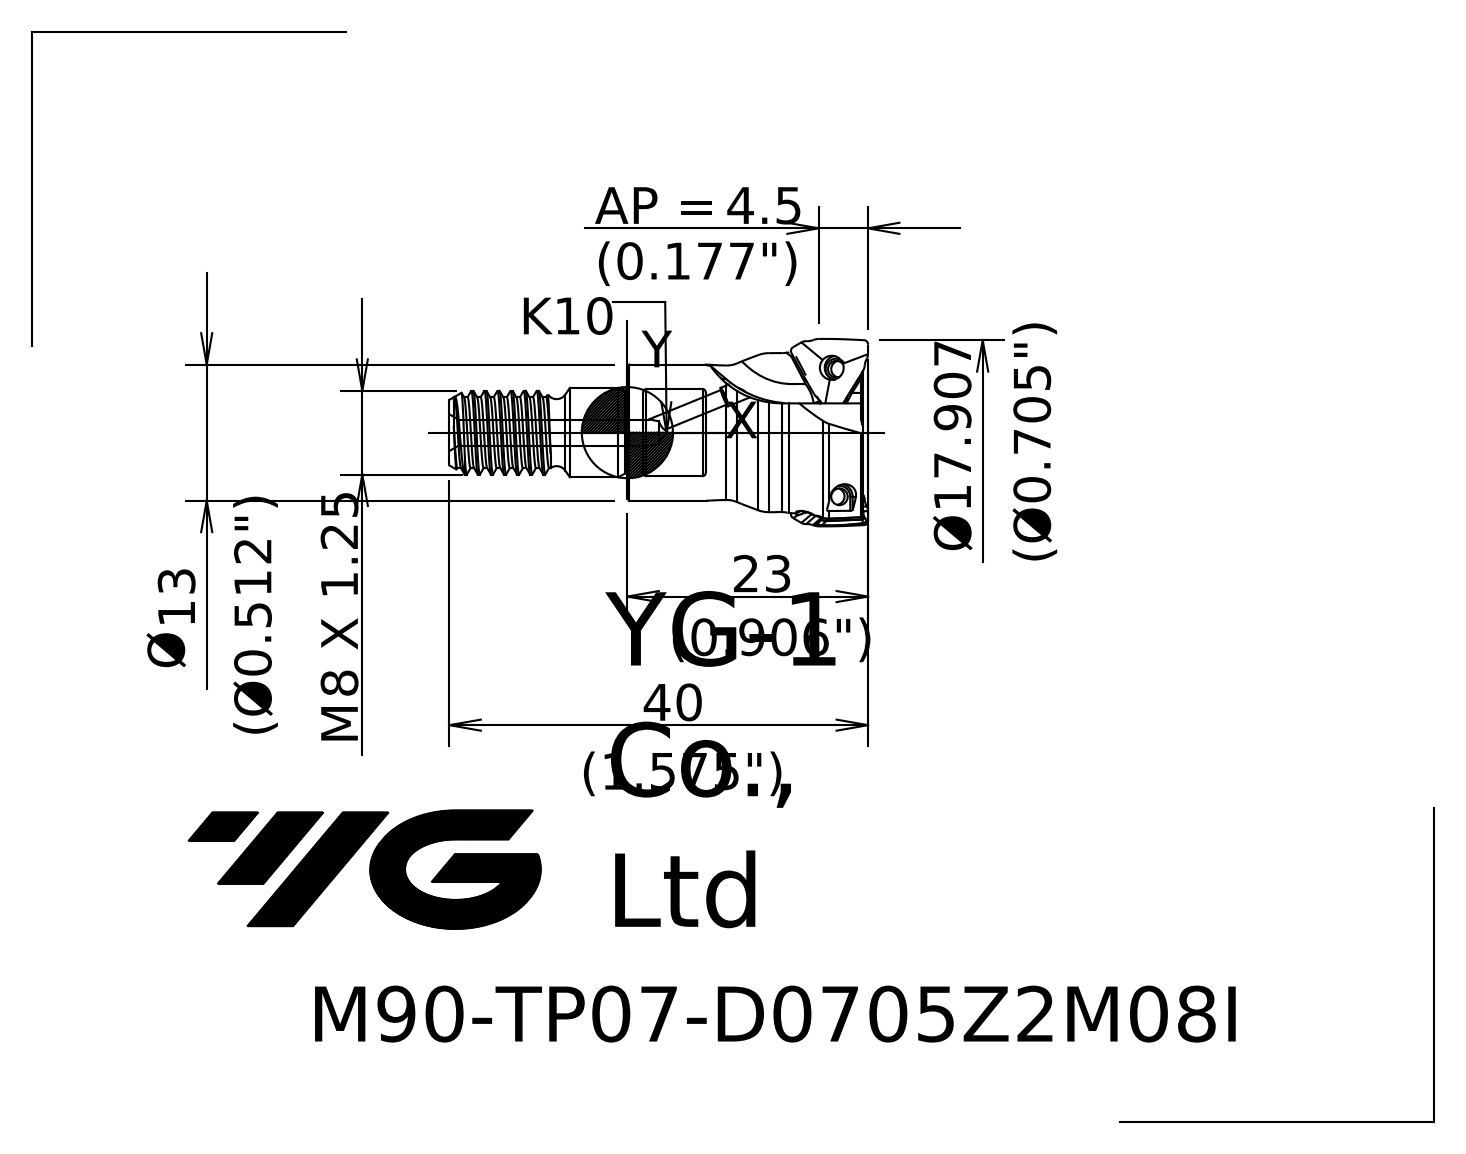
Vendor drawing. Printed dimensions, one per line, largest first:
40
23
Ø17.907
4.5 AP =
M X 1.25 8
